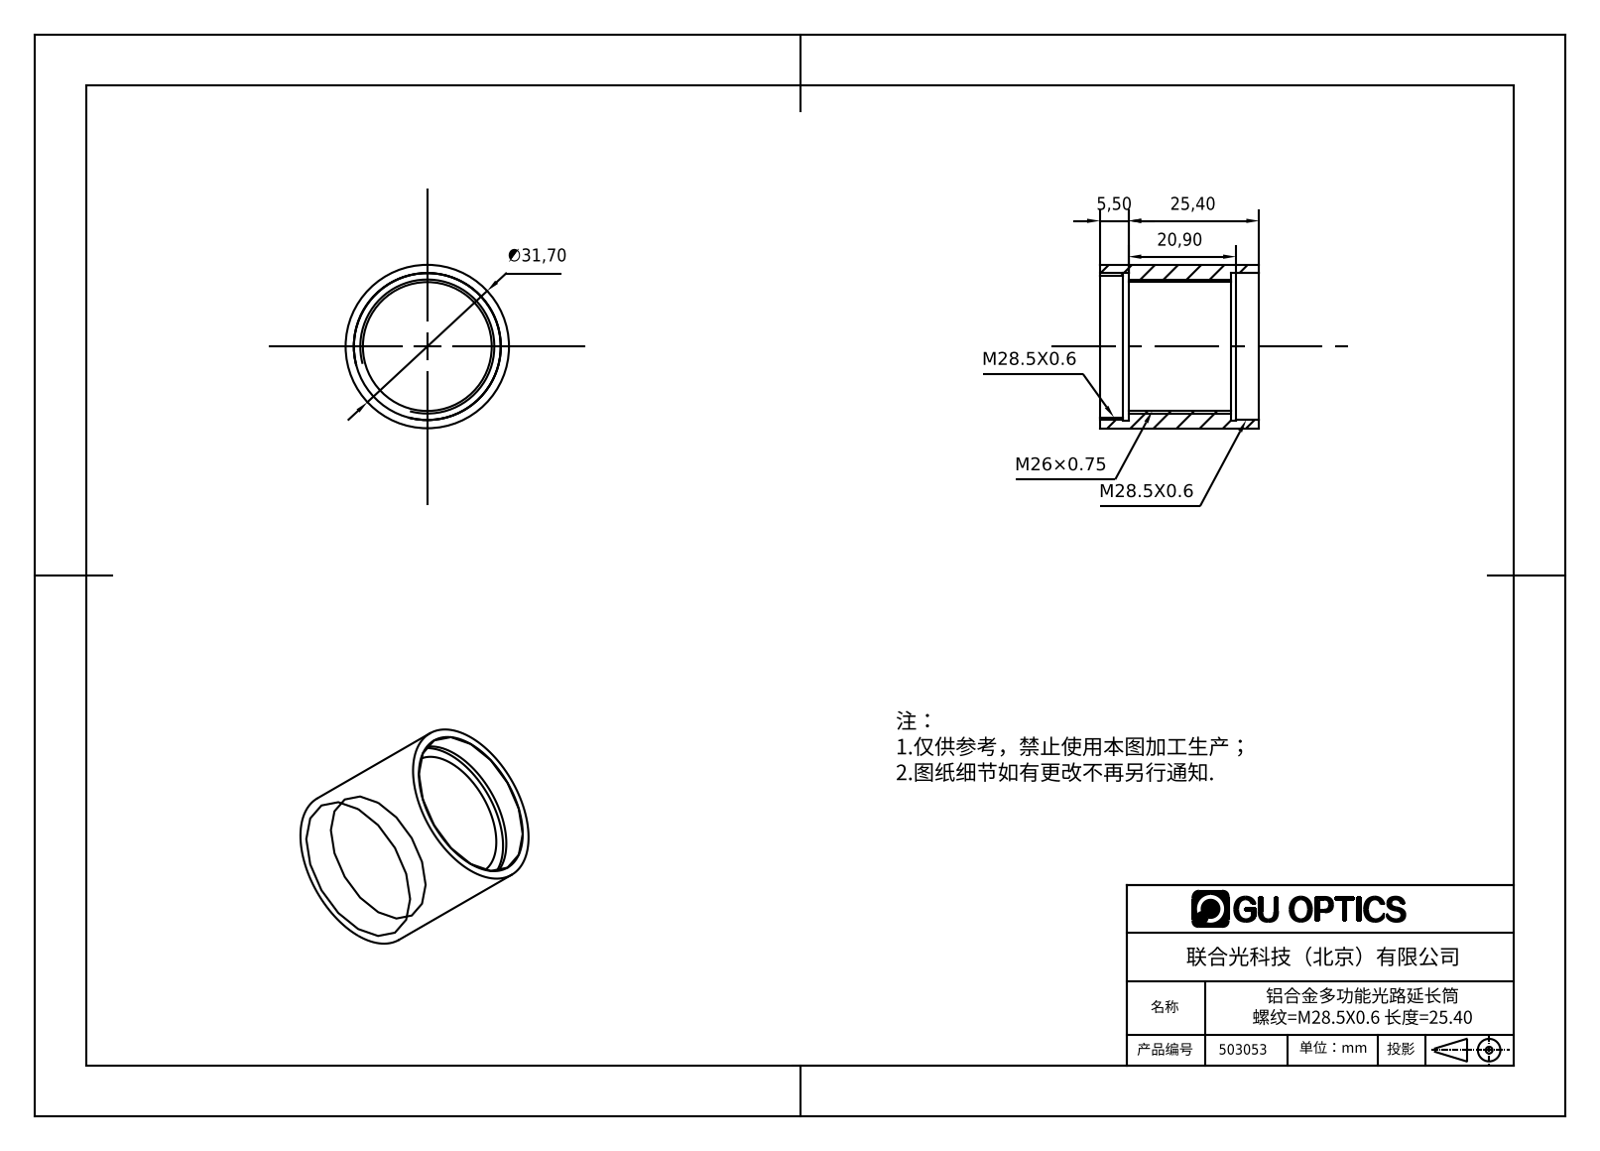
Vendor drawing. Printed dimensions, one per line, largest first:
∅31,70
25,40
20,90
5,50
